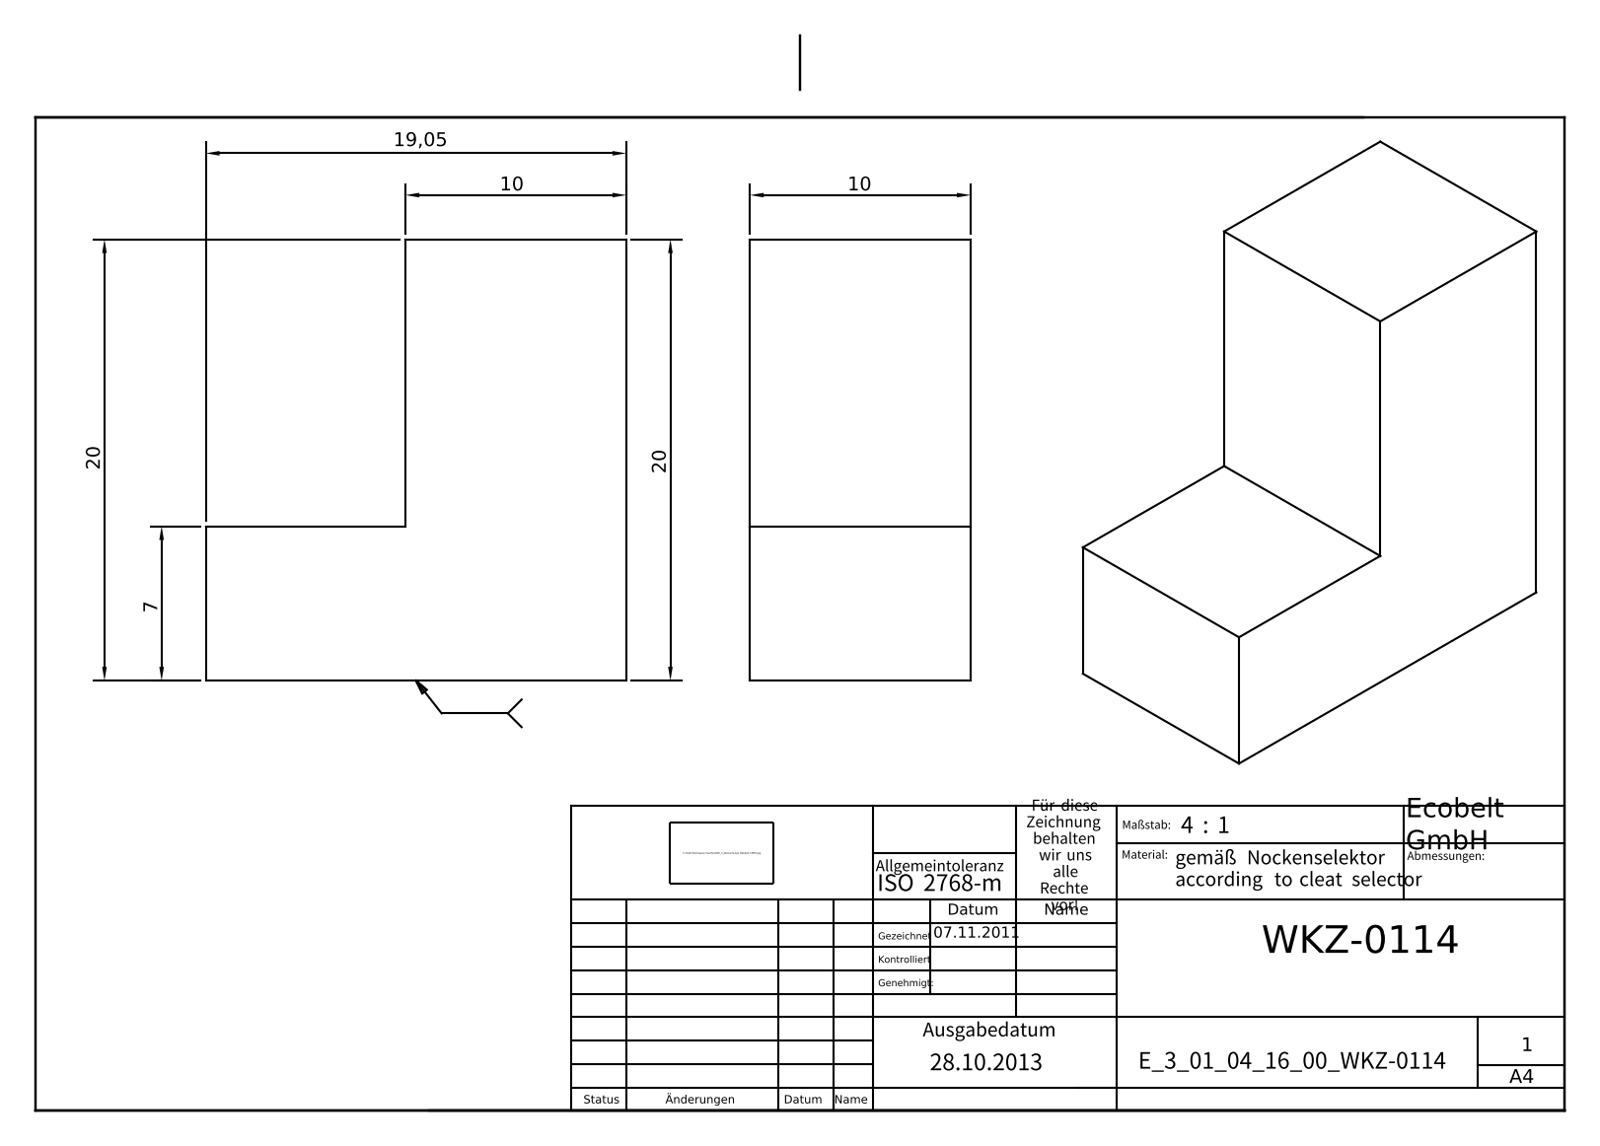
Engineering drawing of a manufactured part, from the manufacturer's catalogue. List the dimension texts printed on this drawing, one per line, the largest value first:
20
20
19,05
10
10
7
